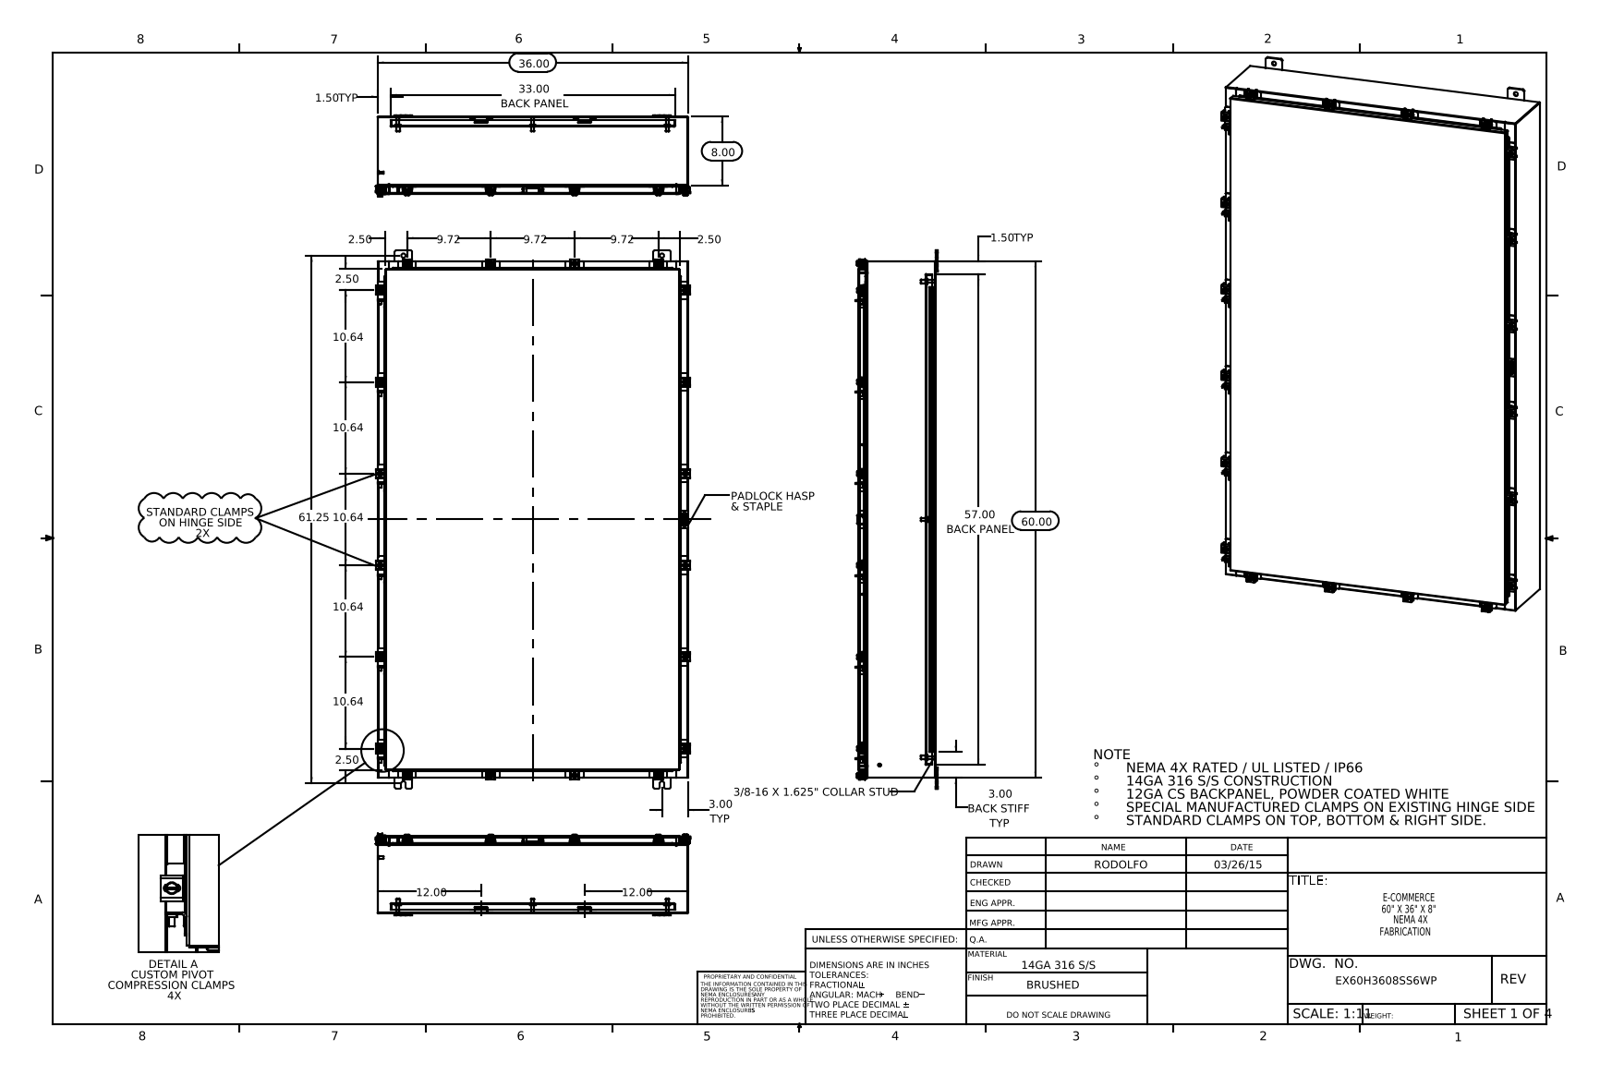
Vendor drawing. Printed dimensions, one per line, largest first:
61.25
60.00
57.00 BACK PANEL
36.00
33.00 BACK PANEL
12.00
12.00
10.64
10.64
10.64
10.64
10.64
9.72
9.72
9.72
8.00
3.00 TYP
3.00 BACK STIFF TYP
2.50
2.50
2.50
2.50
1.50 TYP
1.50 TYP
